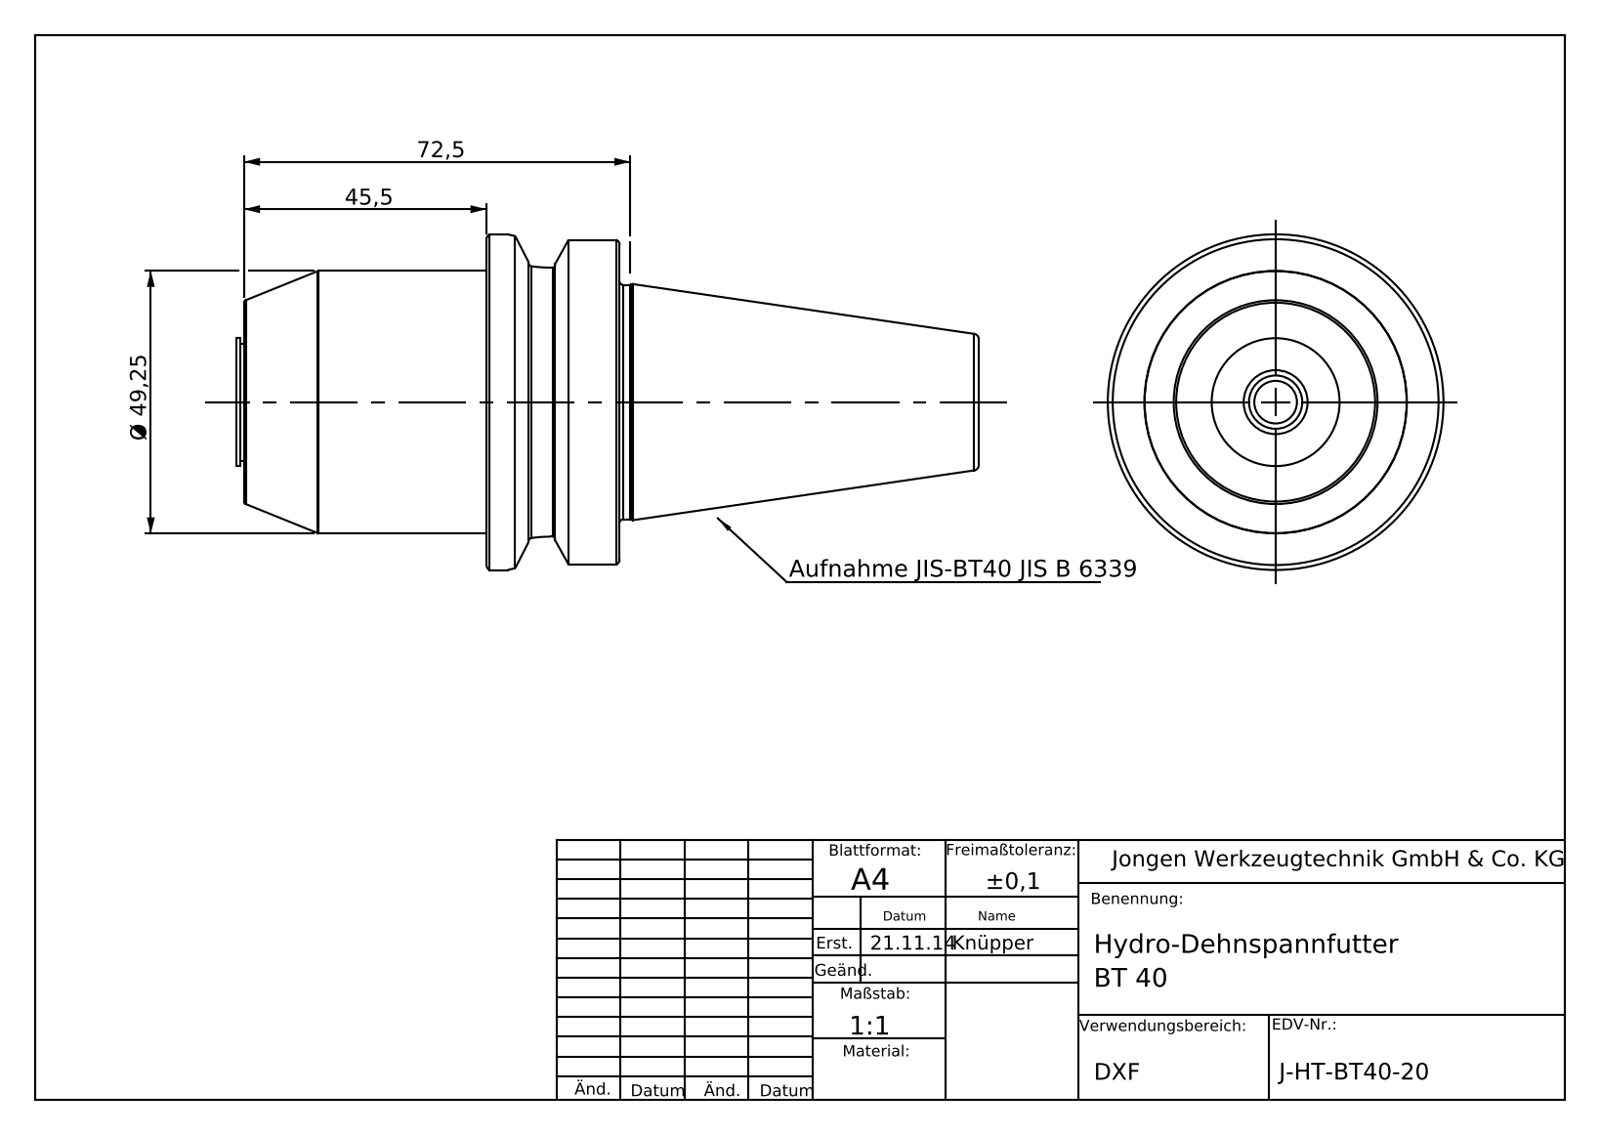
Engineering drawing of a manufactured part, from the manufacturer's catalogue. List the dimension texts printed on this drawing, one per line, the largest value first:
72,5
Ø 49,25
45,5
